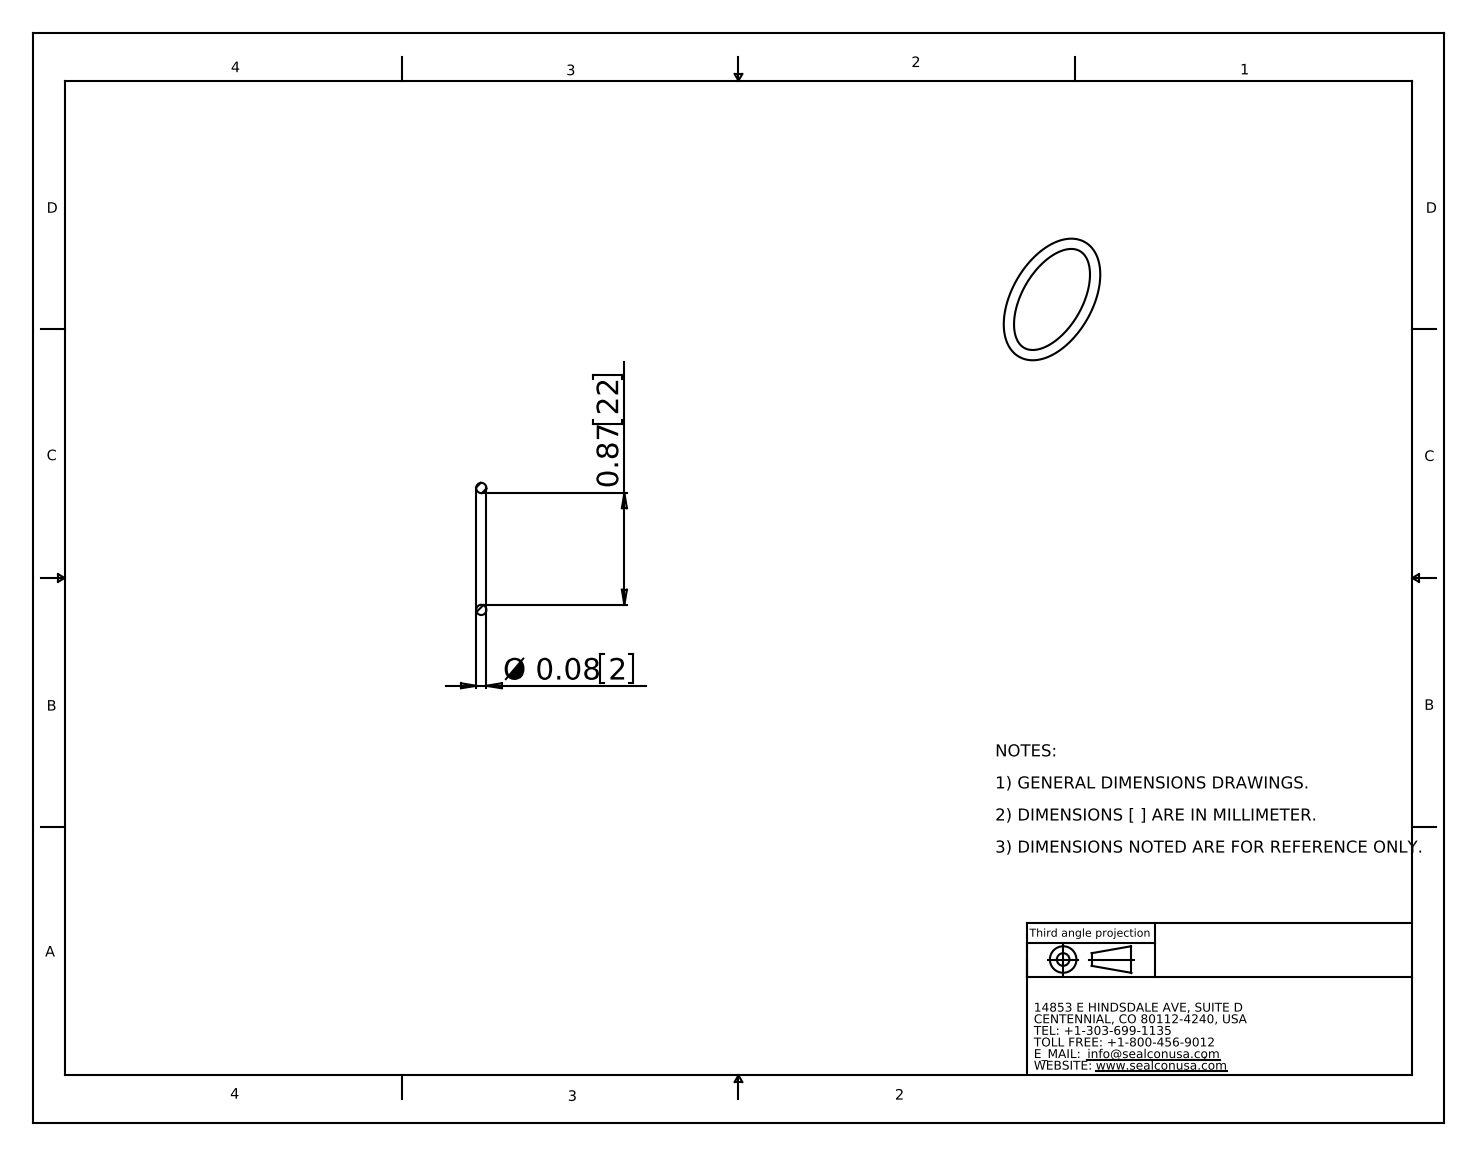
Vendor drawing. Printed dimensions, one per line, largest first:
0.87 22
Ø 0.08 2
